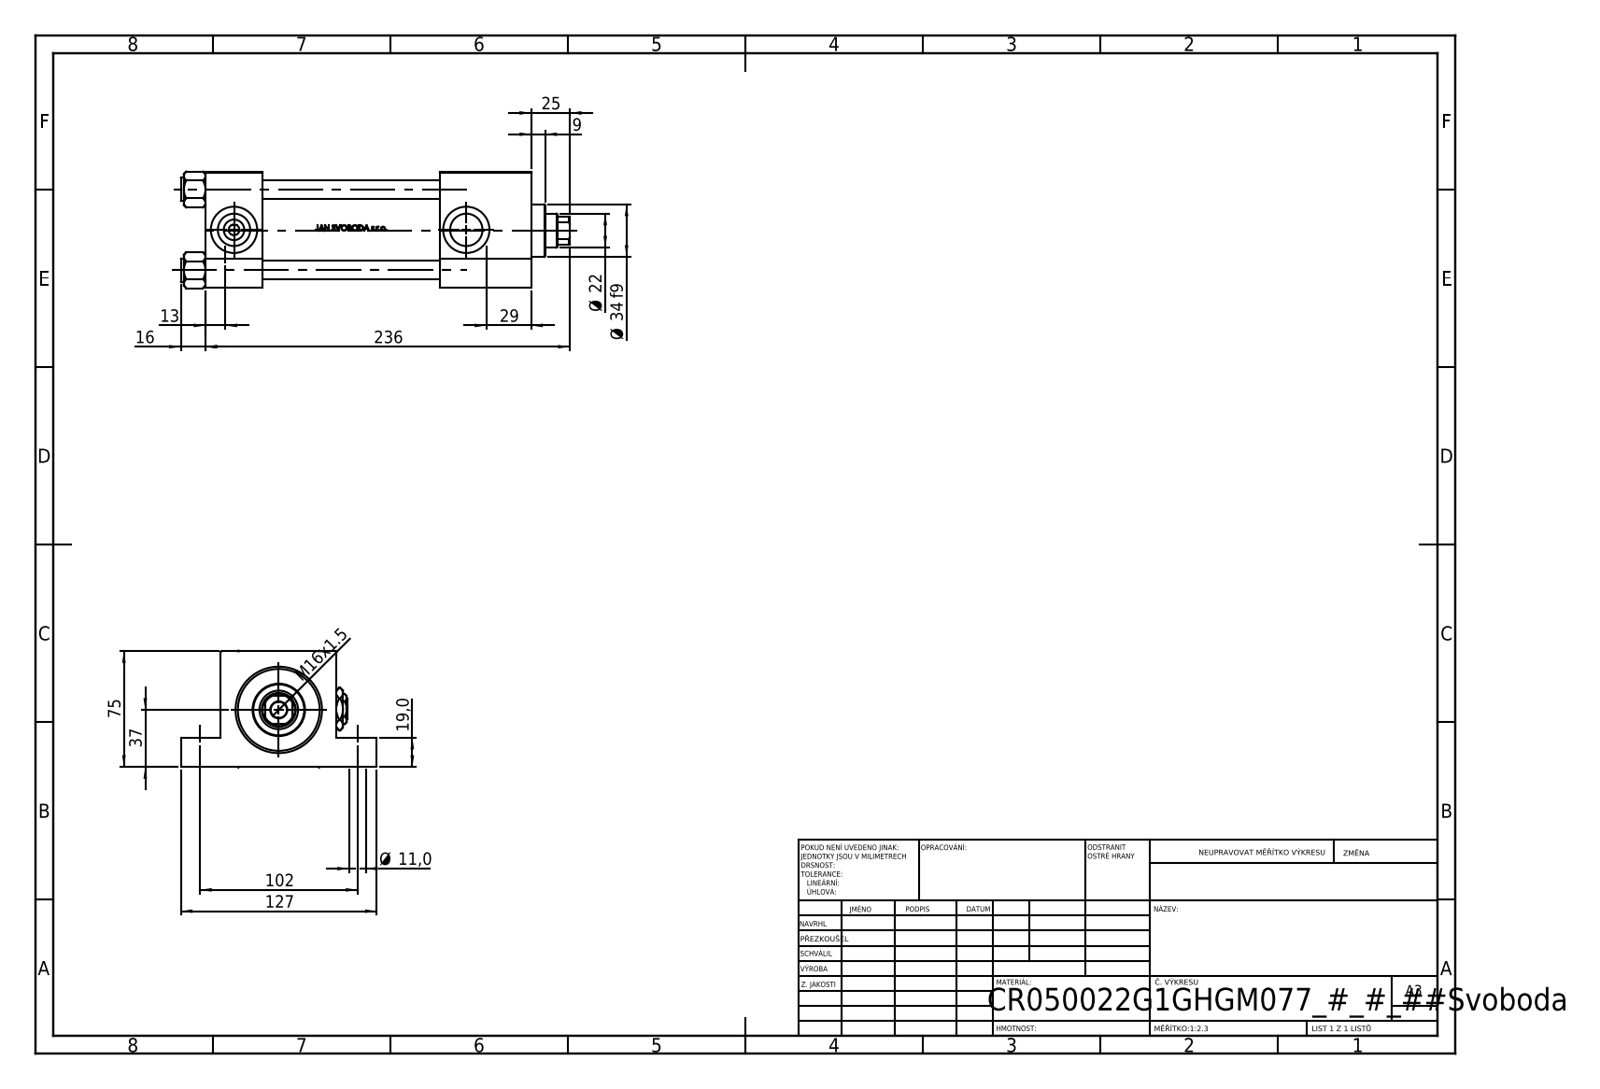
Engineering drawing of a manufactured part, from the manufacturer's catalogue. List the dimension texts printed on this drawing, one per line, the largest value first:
236
127
102
75
37
Ø 34 f9
29
25
Ø 22
19,0
16
M16x1.5
13
Ø 11,0
9
